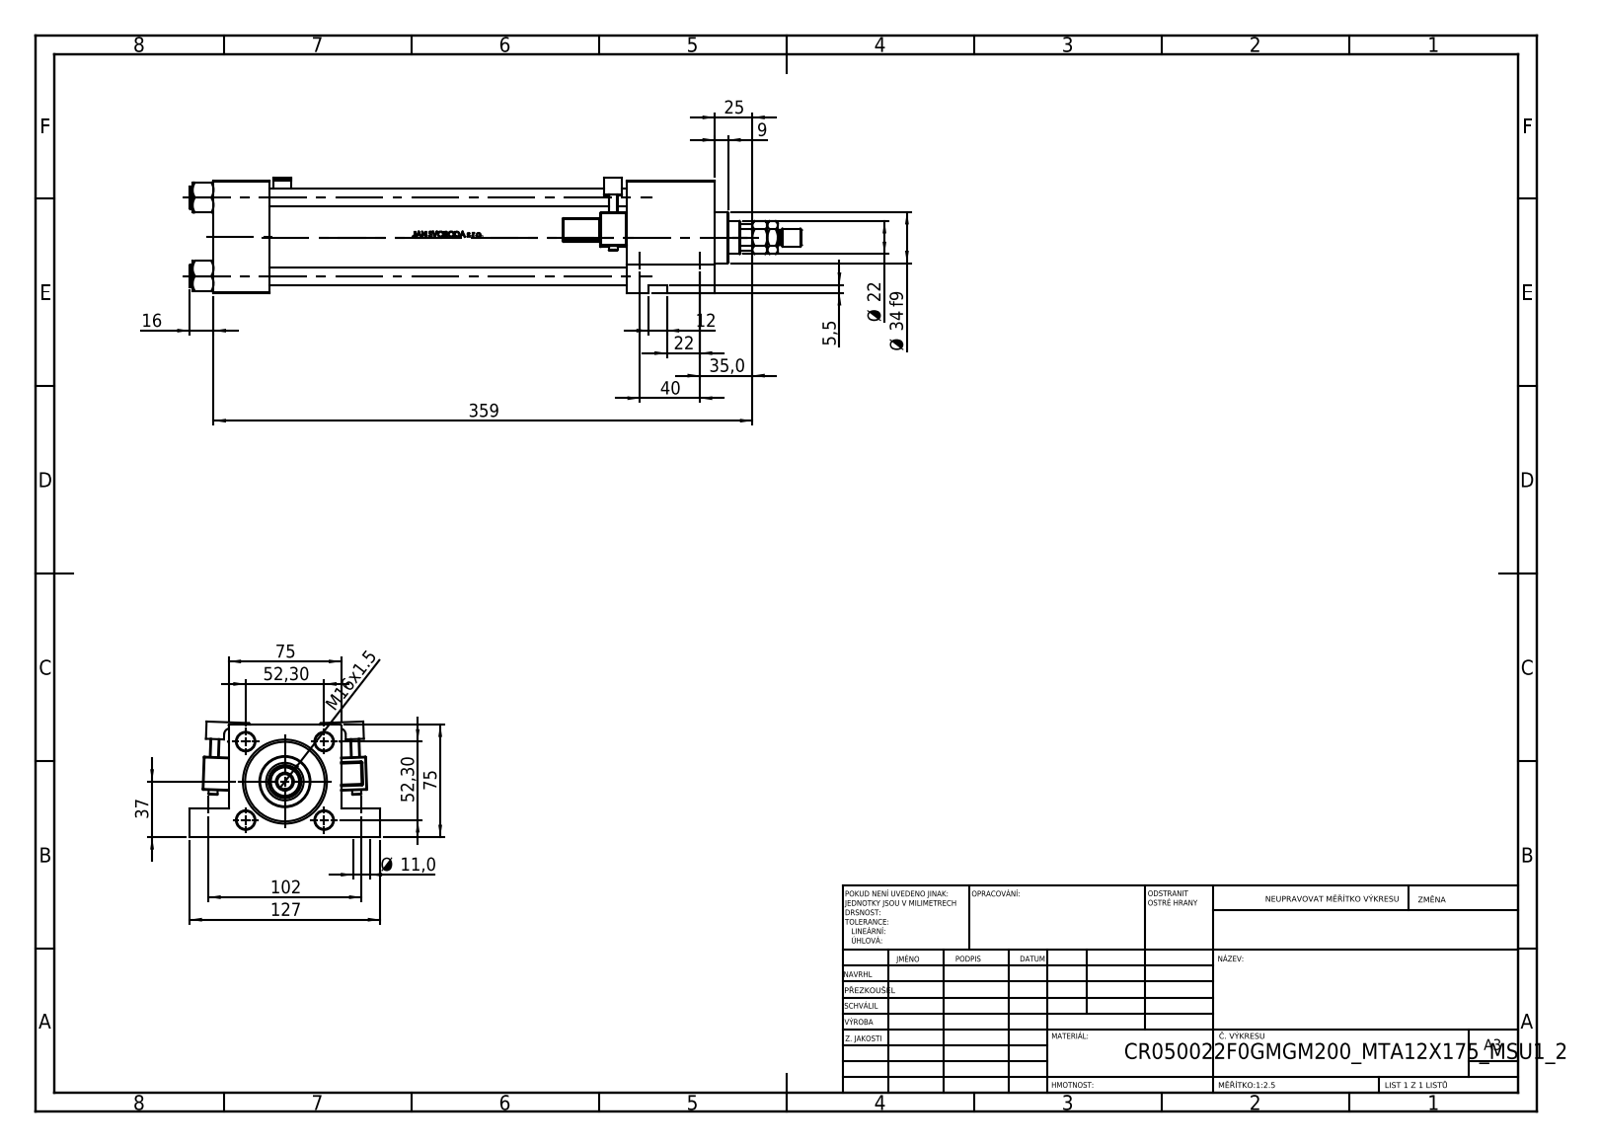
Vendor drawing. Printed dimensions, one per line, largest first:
359
127
102
75
75
52,30
52,30
40
37
35,0
Ø 34 f9
25
Ø 22
22
16
M16x1.5
12
Ø 11,0
9
5,5
